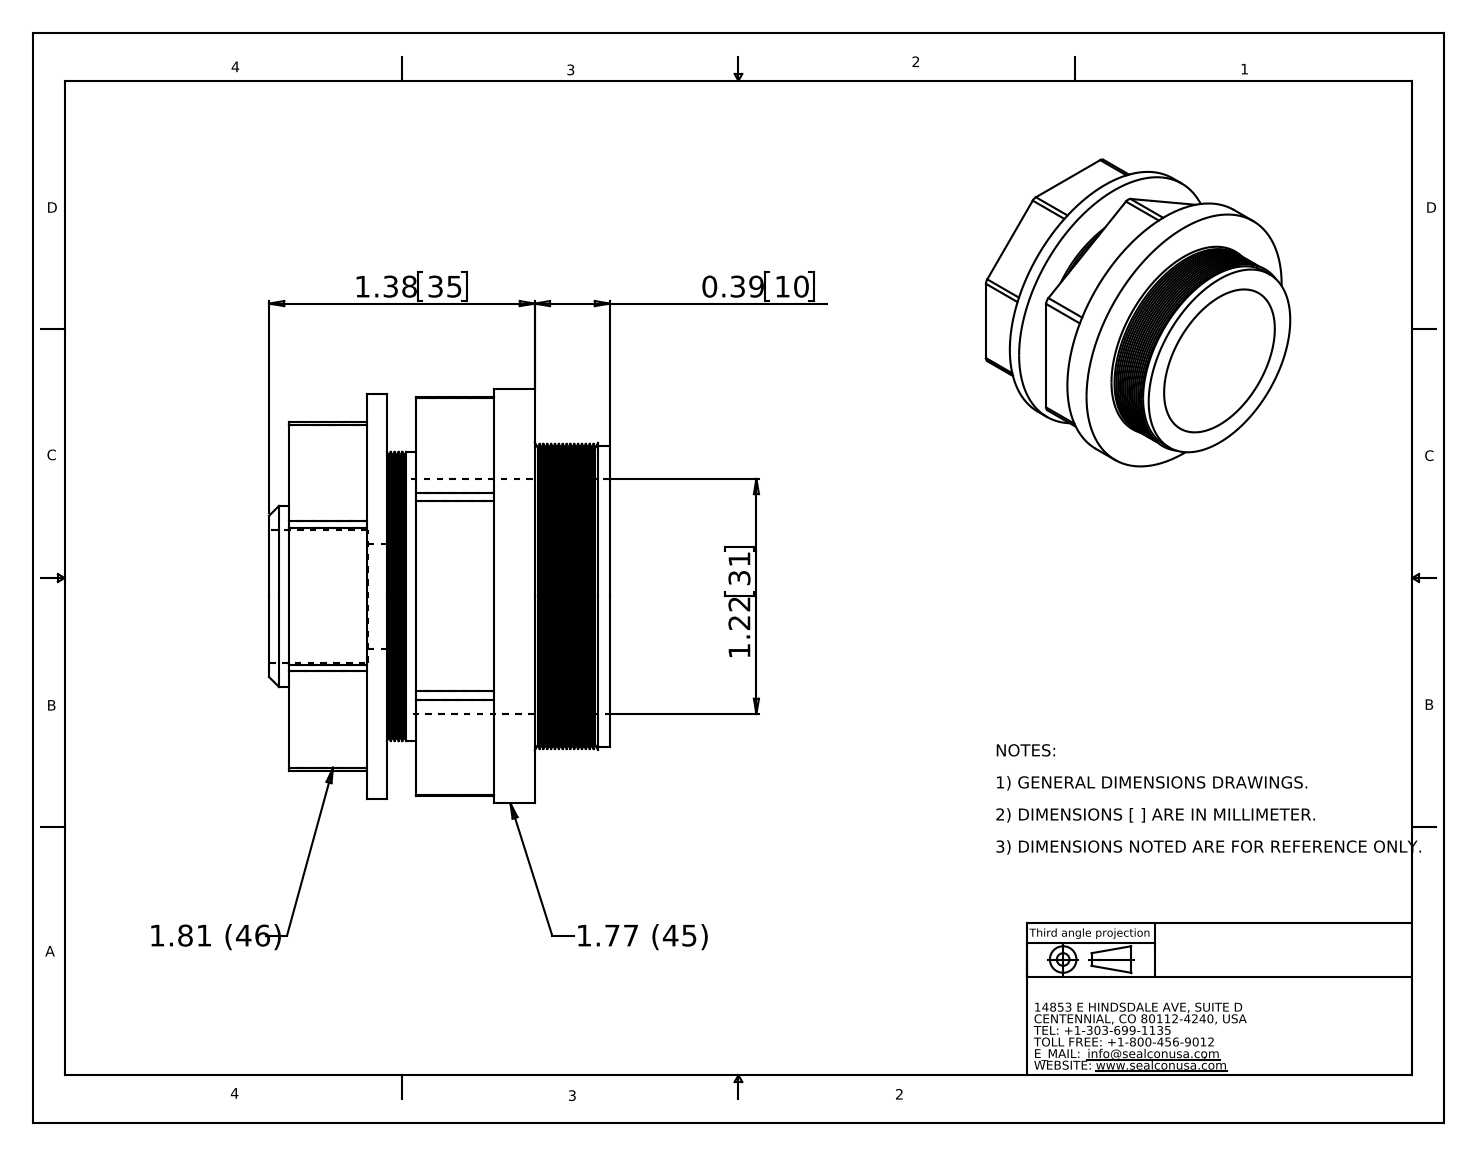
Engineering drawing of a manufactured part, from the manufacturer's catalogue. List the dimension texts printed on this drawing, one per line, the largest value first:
1.38 35
1.22 31
0.39 10
